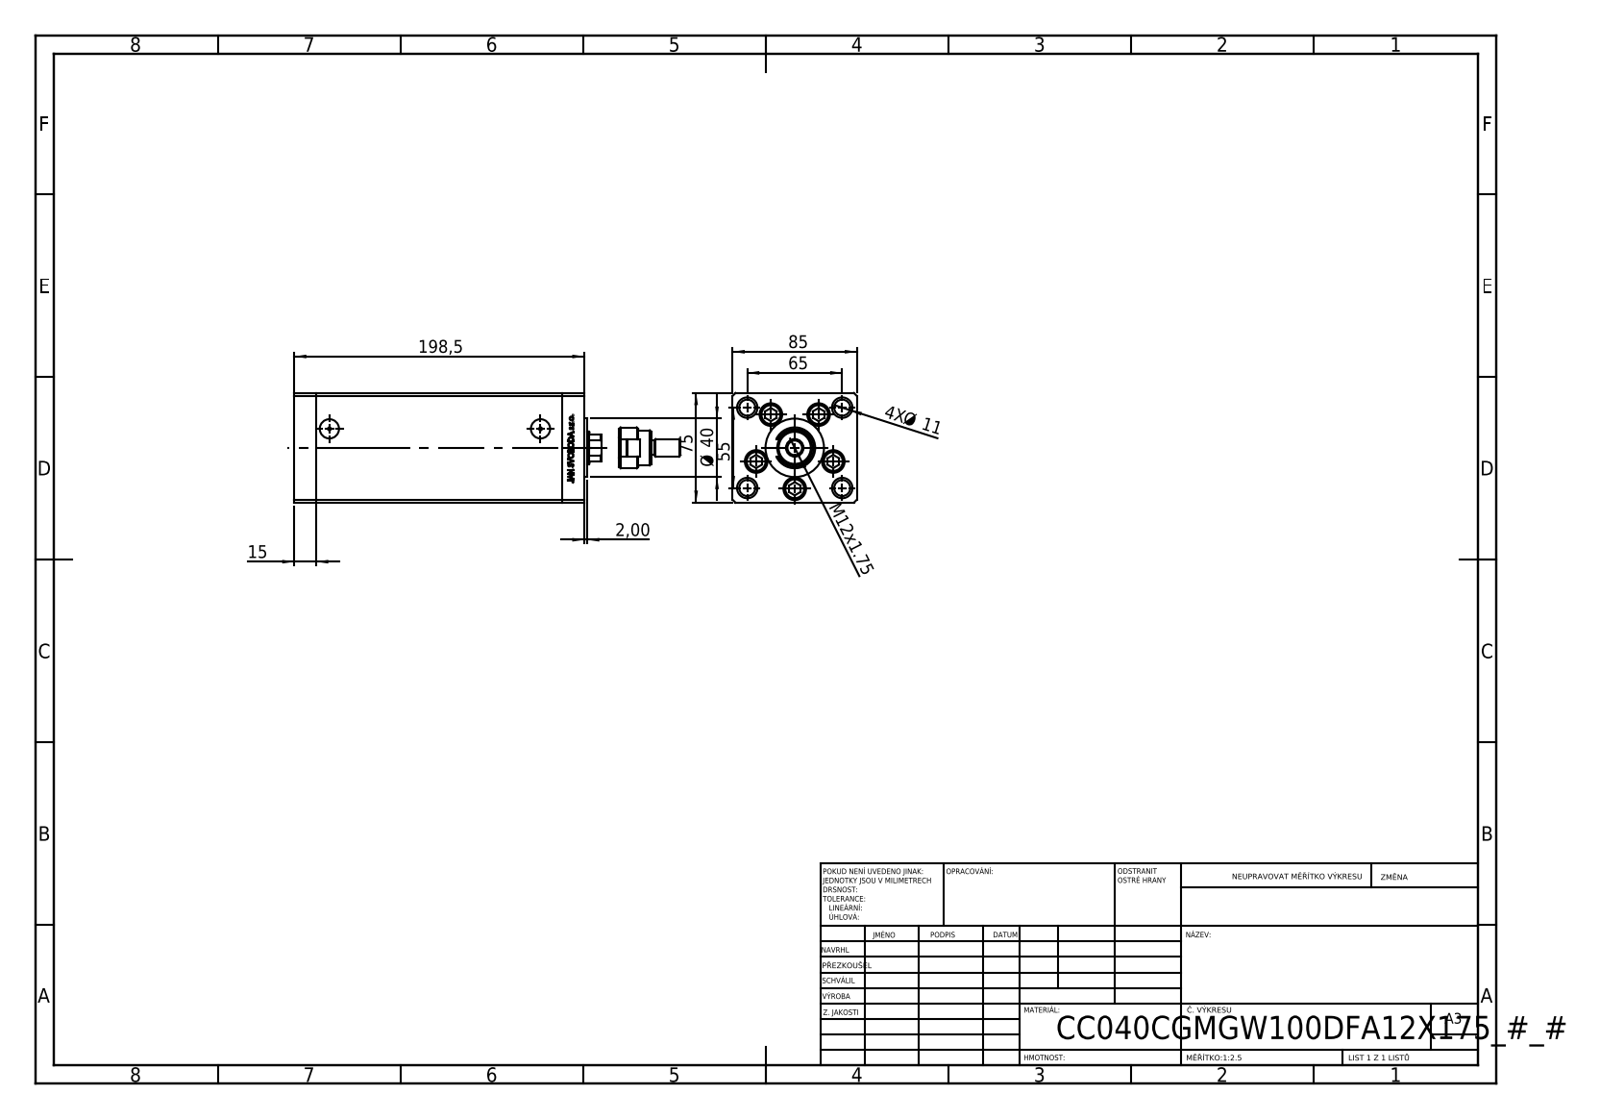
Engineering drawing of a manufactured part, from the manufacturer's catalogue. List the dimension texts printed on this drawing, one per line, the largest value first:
198,5
85
75
65
55
Ø 40
15
M12x1.75
4X Ø 11
2,00
